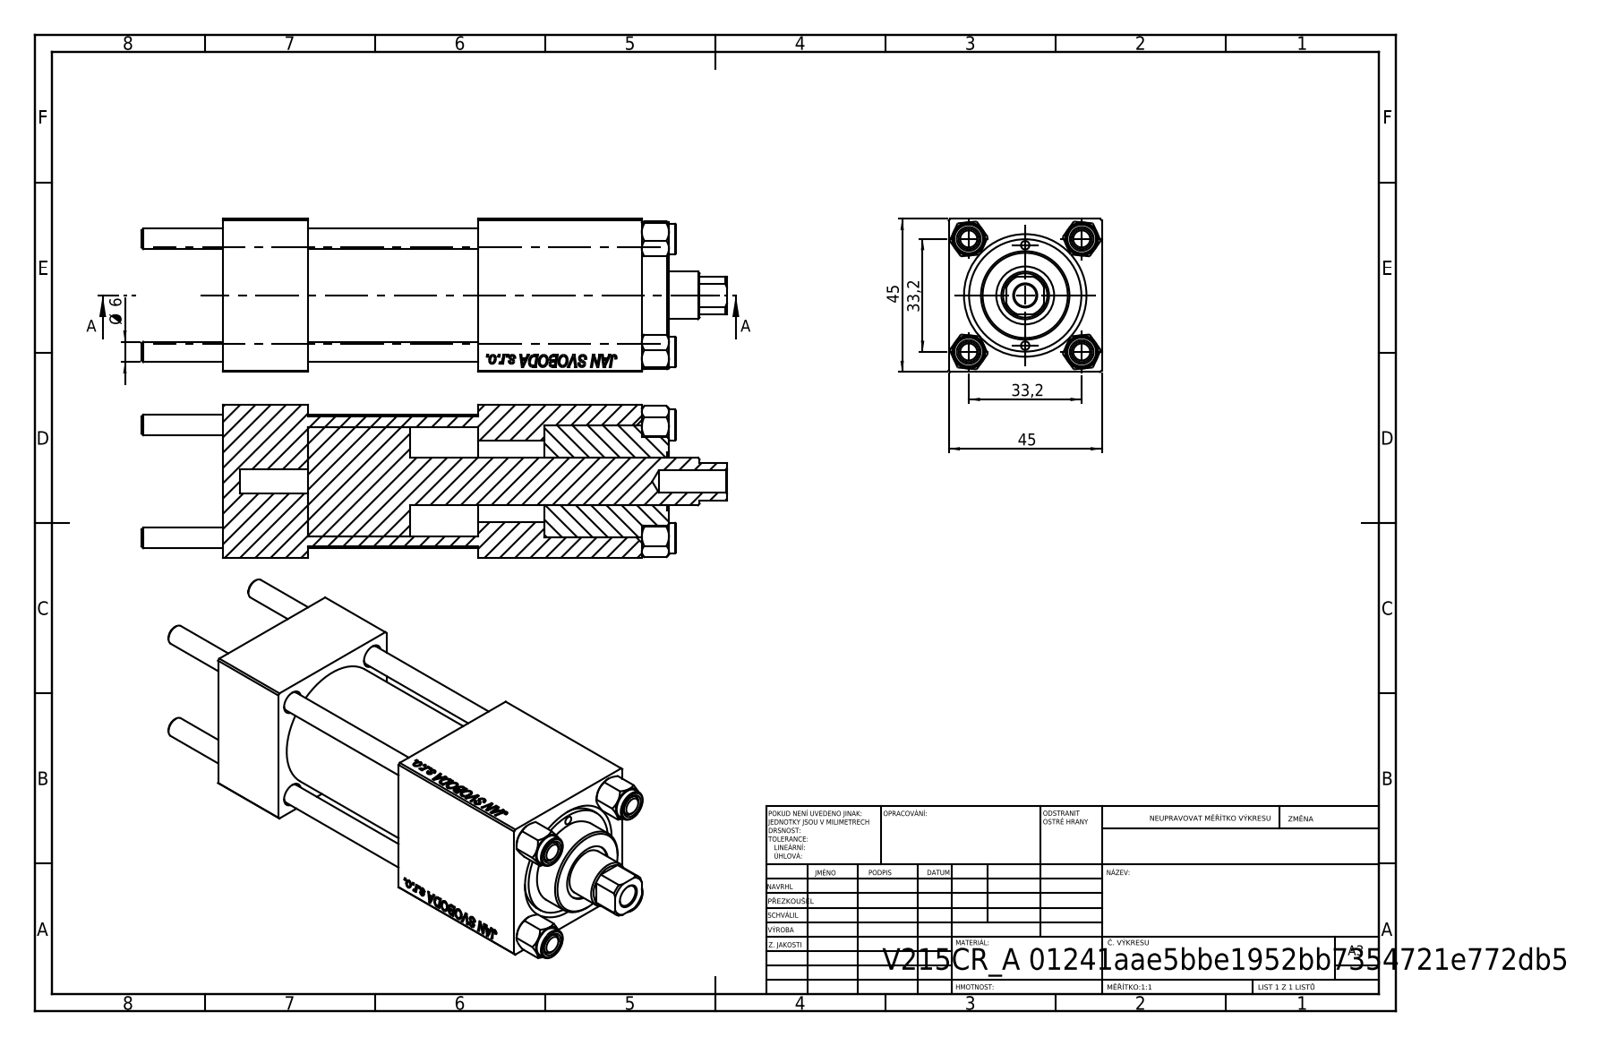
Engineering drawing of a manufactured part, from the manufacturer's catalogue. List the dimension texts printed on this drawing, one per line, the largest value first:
45
45
33,2
33,2
Ø 6
